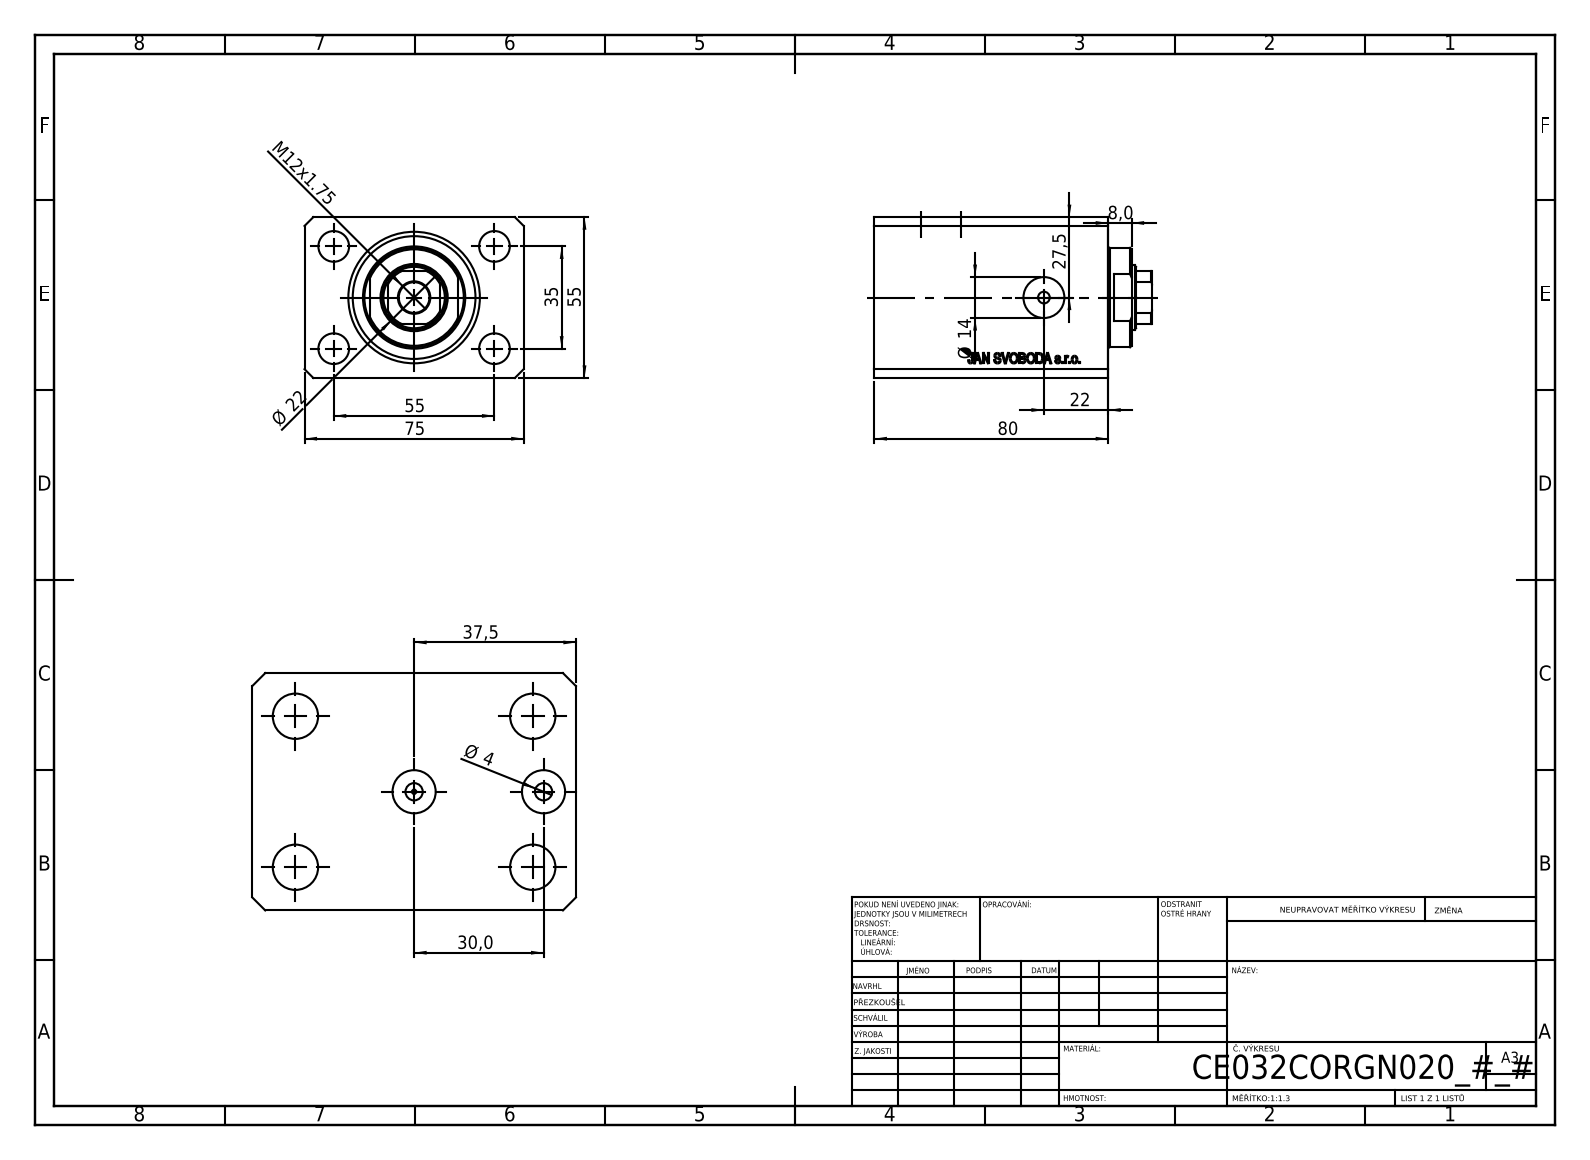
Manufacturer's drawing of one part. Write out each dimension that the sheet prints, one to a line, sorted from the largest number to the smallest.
80
75
55
55
37,5
35
30,0
27,5
Ø 22
22
Ø 14
M12x1.75
8,0
Ø 4
